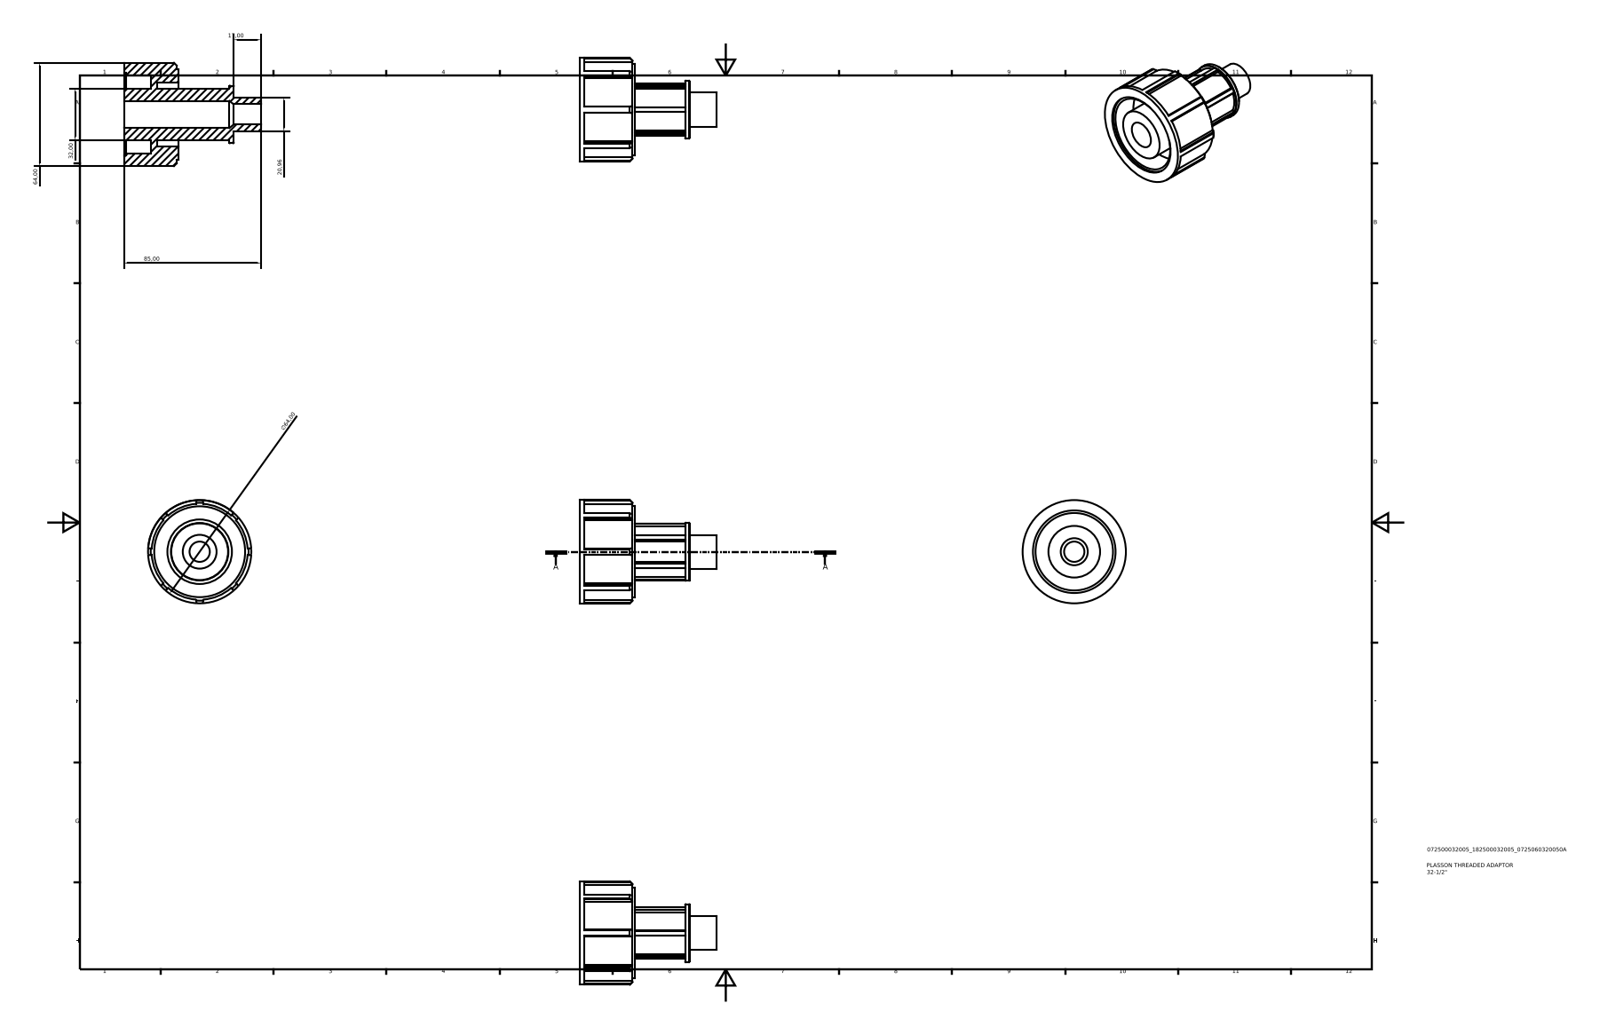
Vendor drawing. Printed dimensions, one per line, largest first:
85,00
64,00
∅64,00
32,00
20,96
17,00
